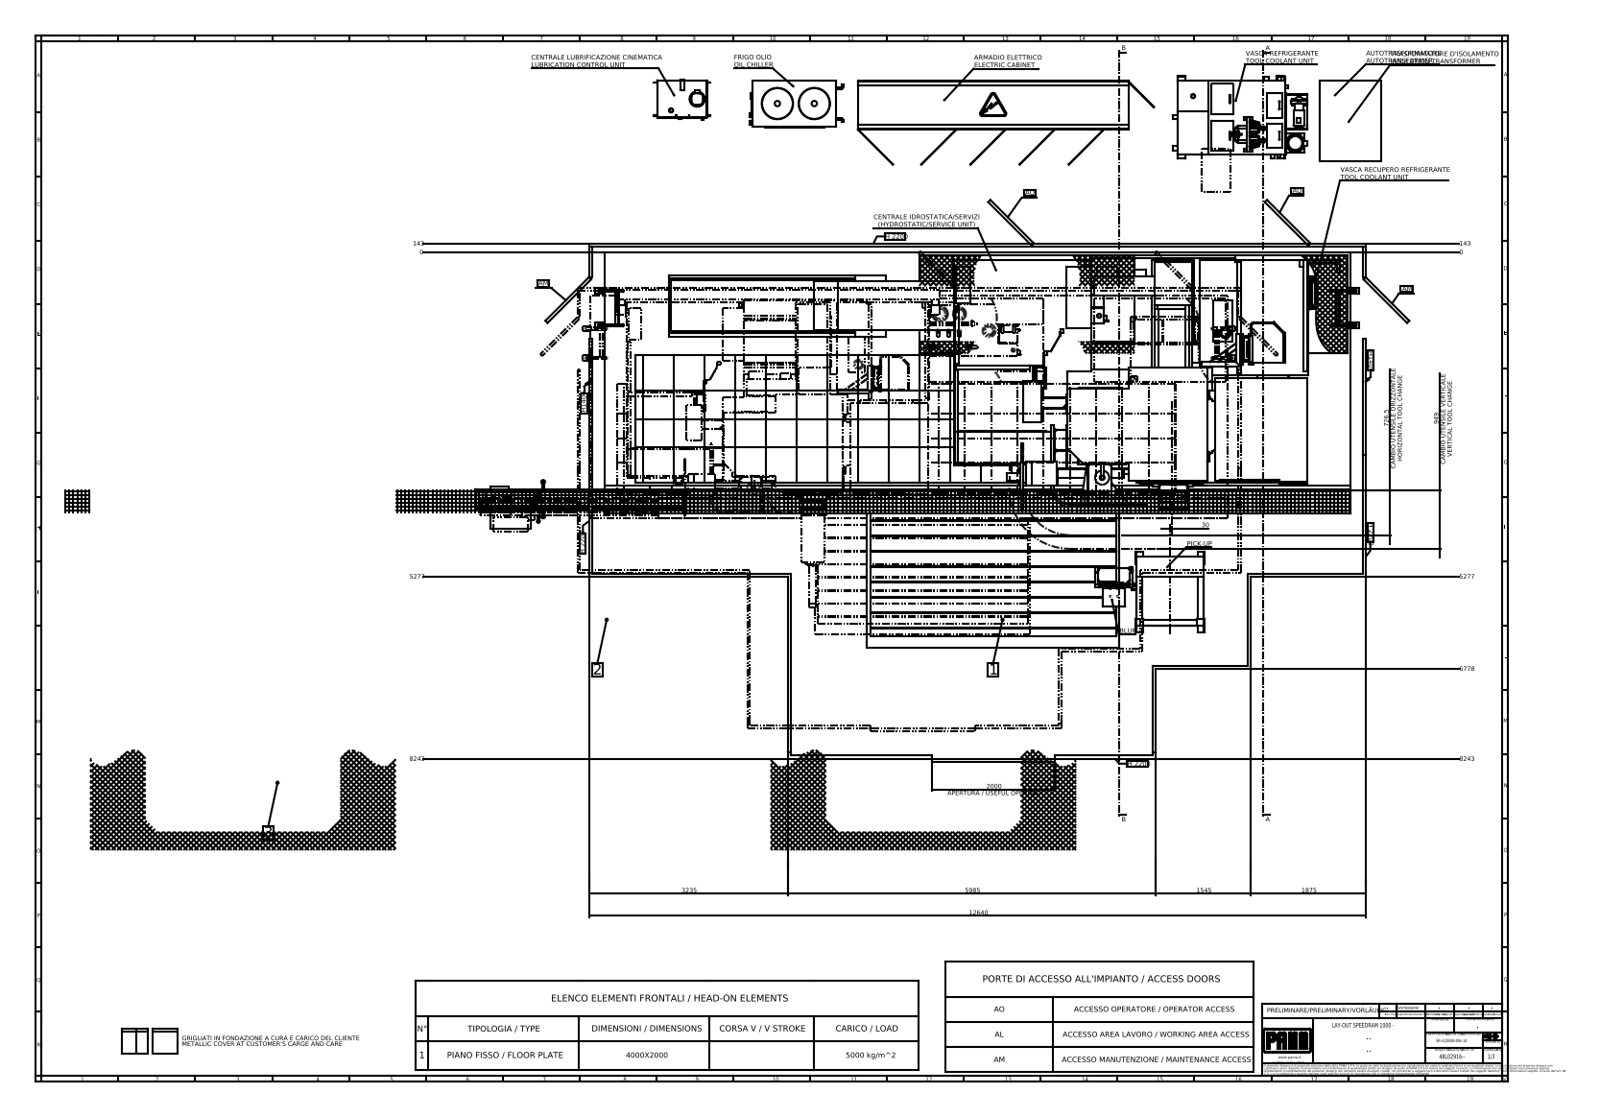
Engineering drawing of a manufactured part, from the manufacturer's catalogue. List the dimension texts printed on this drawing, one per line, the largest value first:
12640
8243
8243
6778
5985
5277
5277
3235
2000 APERTURA / USEFUL OPENING
1875
1545
949 CAMBIO UTENSILE VERTICALE VERTICAL TOOL CHANGE
726,5 CAMBIO UTENSILE ORIZZONTALE HORIZONTAL TOOL CHANGE
143
143
30
0
0
